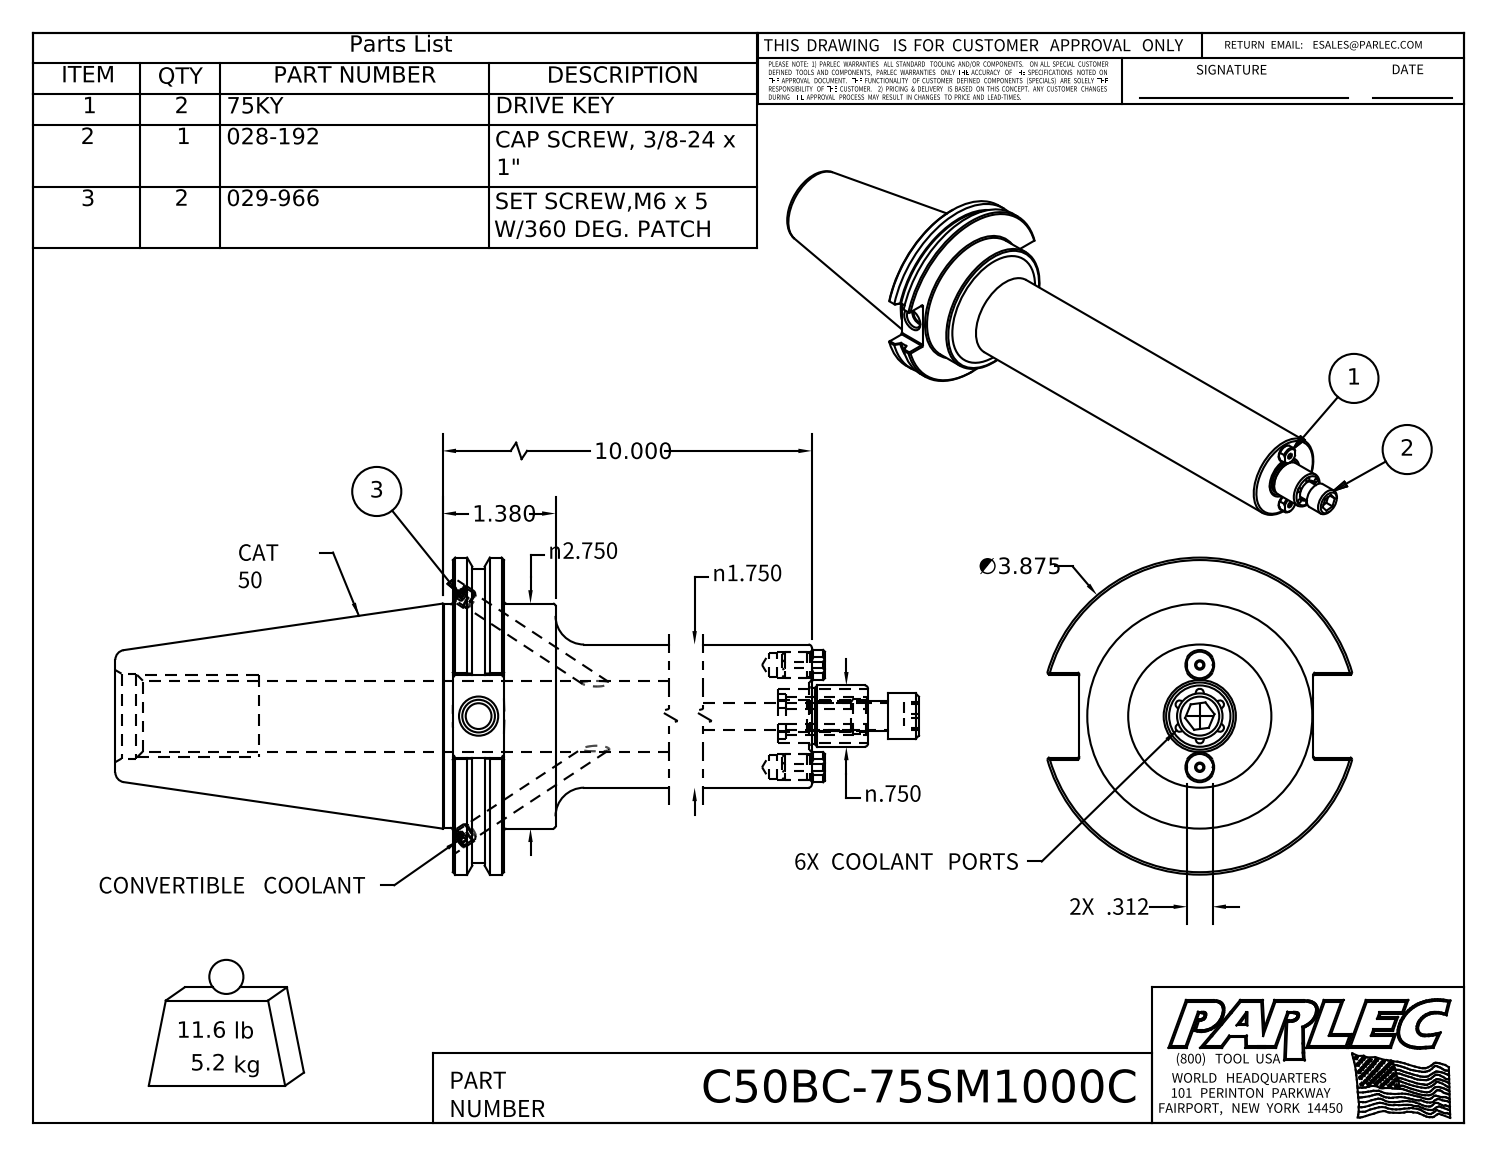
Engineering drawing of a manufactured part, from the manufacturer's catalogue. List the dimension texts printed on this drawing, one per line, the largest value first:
10.000
∅3.875
n2.750
n1.750
1.380
n.750
2X .312
